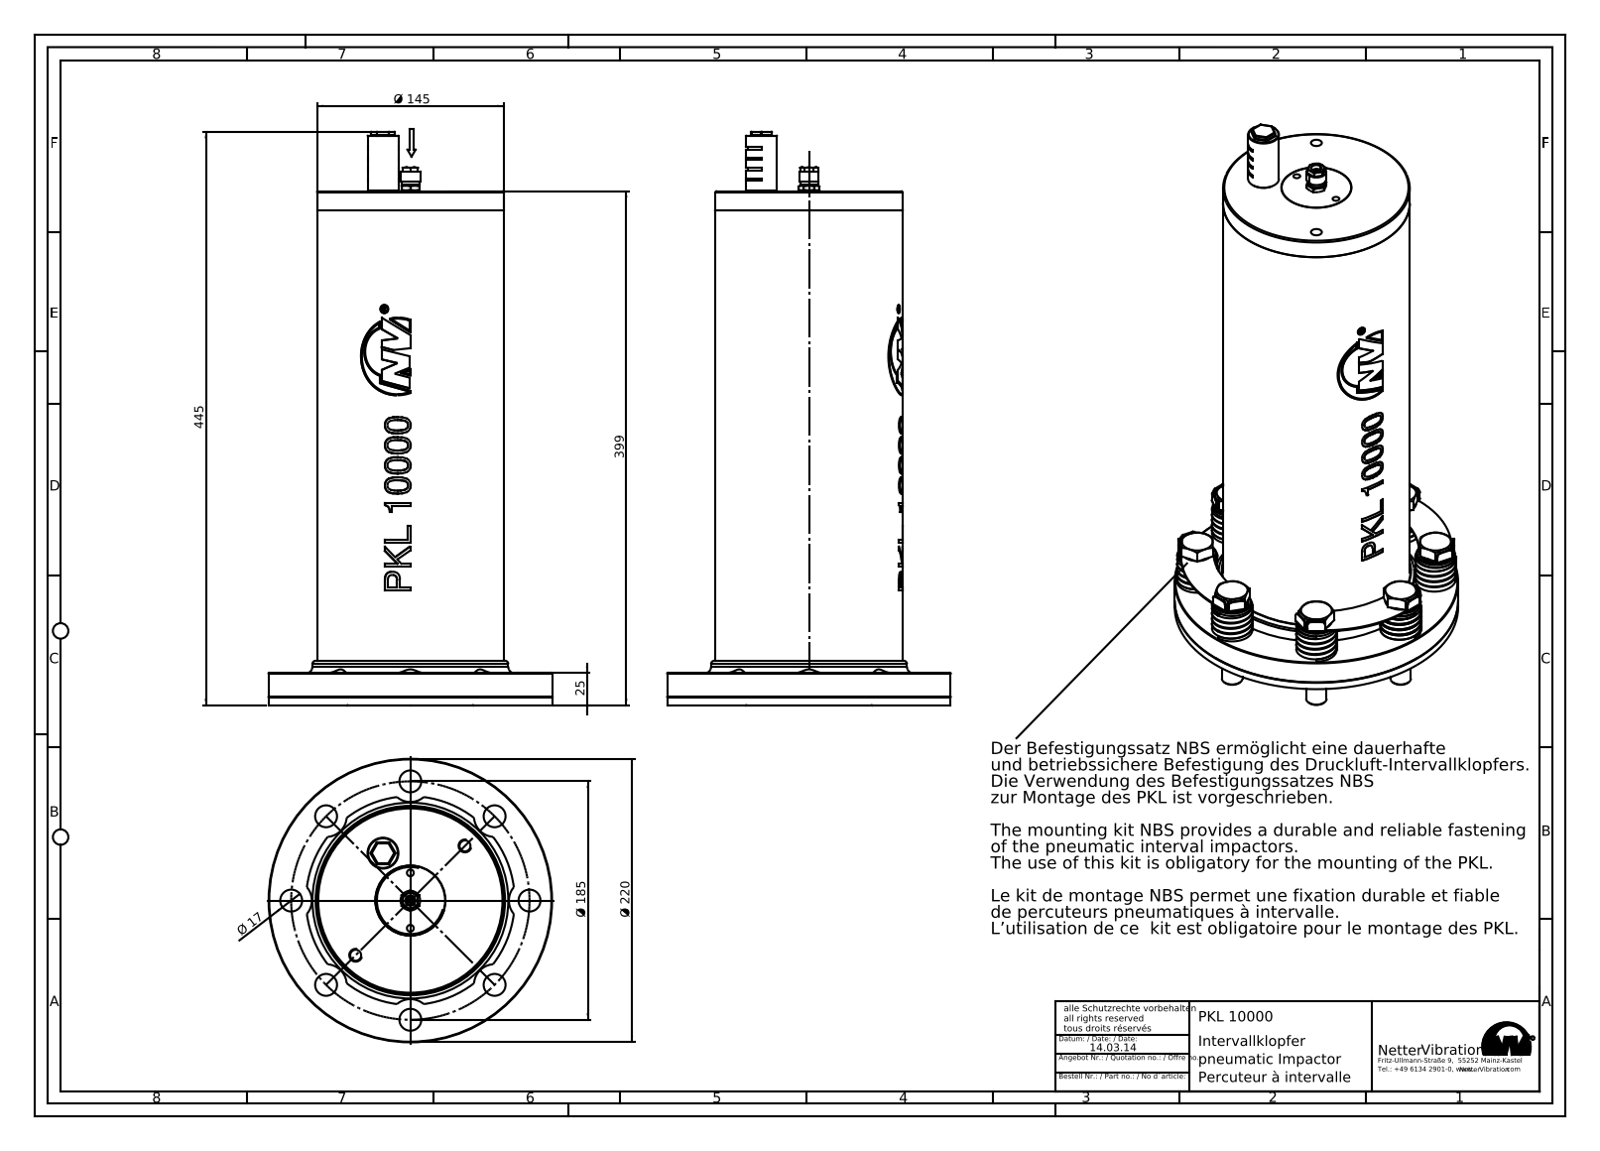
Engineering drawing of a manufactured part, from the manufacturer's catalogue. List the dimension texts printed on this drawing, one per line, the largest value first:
445
399
Ø 220
Ø 185
Ø 145
25
Ø 17
